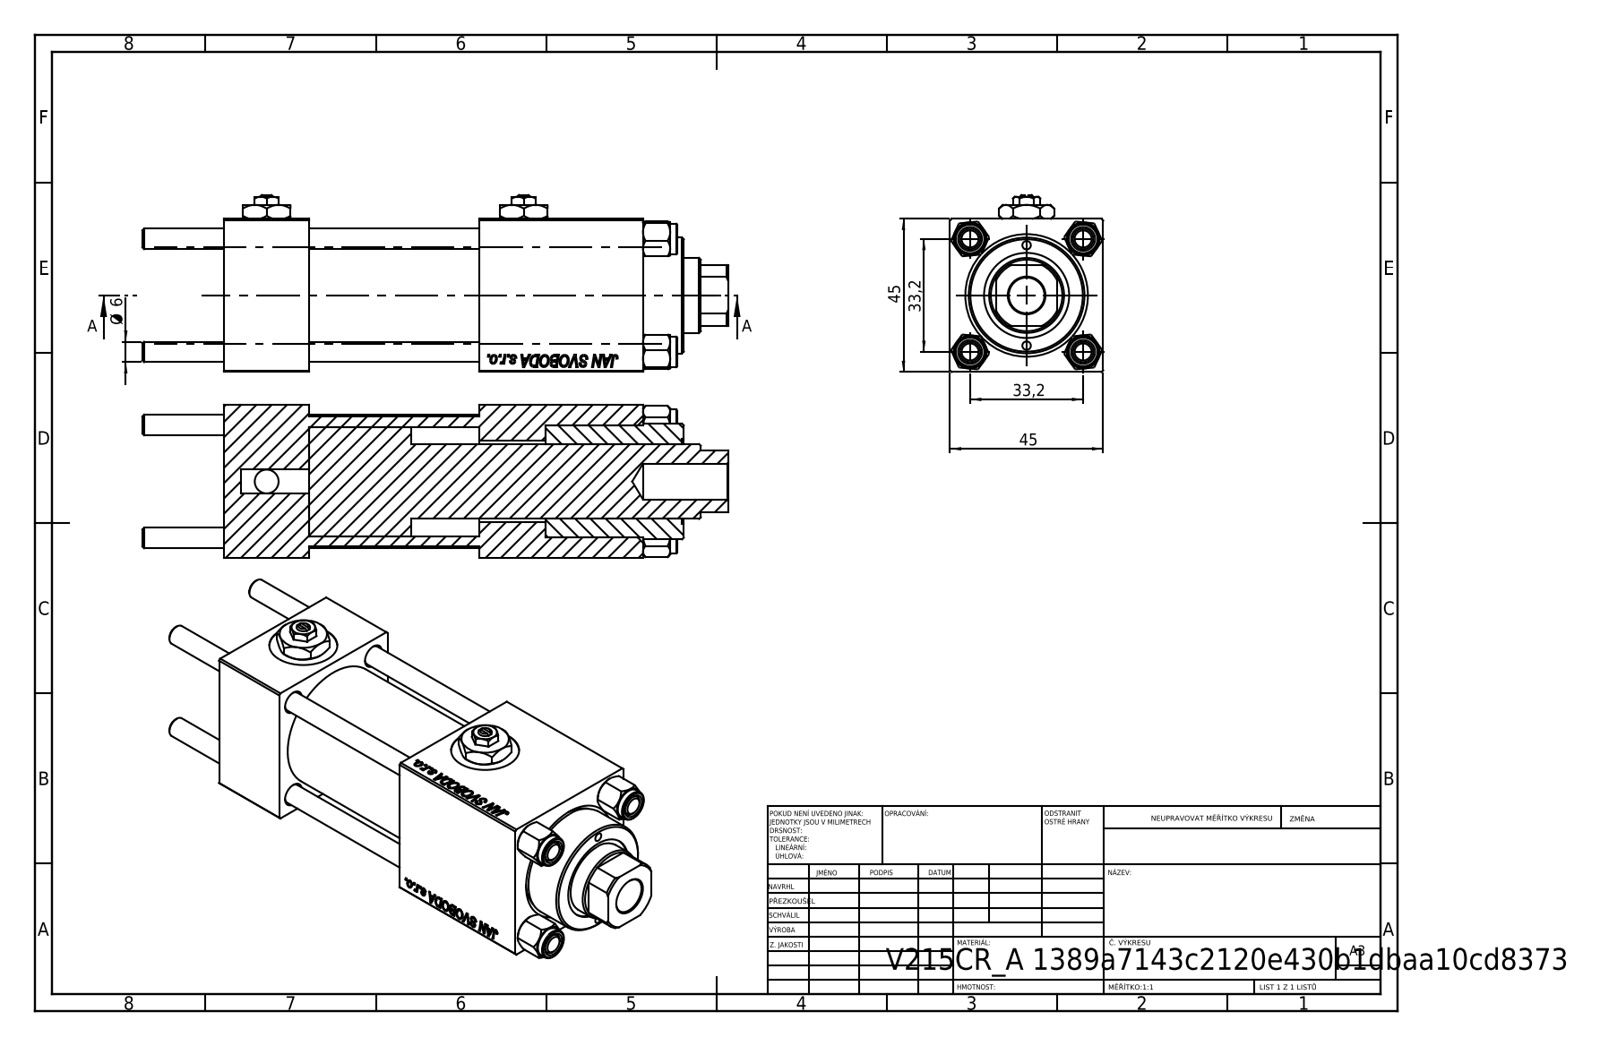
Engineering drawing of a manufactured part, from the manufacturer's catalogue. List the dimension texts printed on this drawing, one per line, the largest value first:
45
45
33,2
33,2
Ø 6
